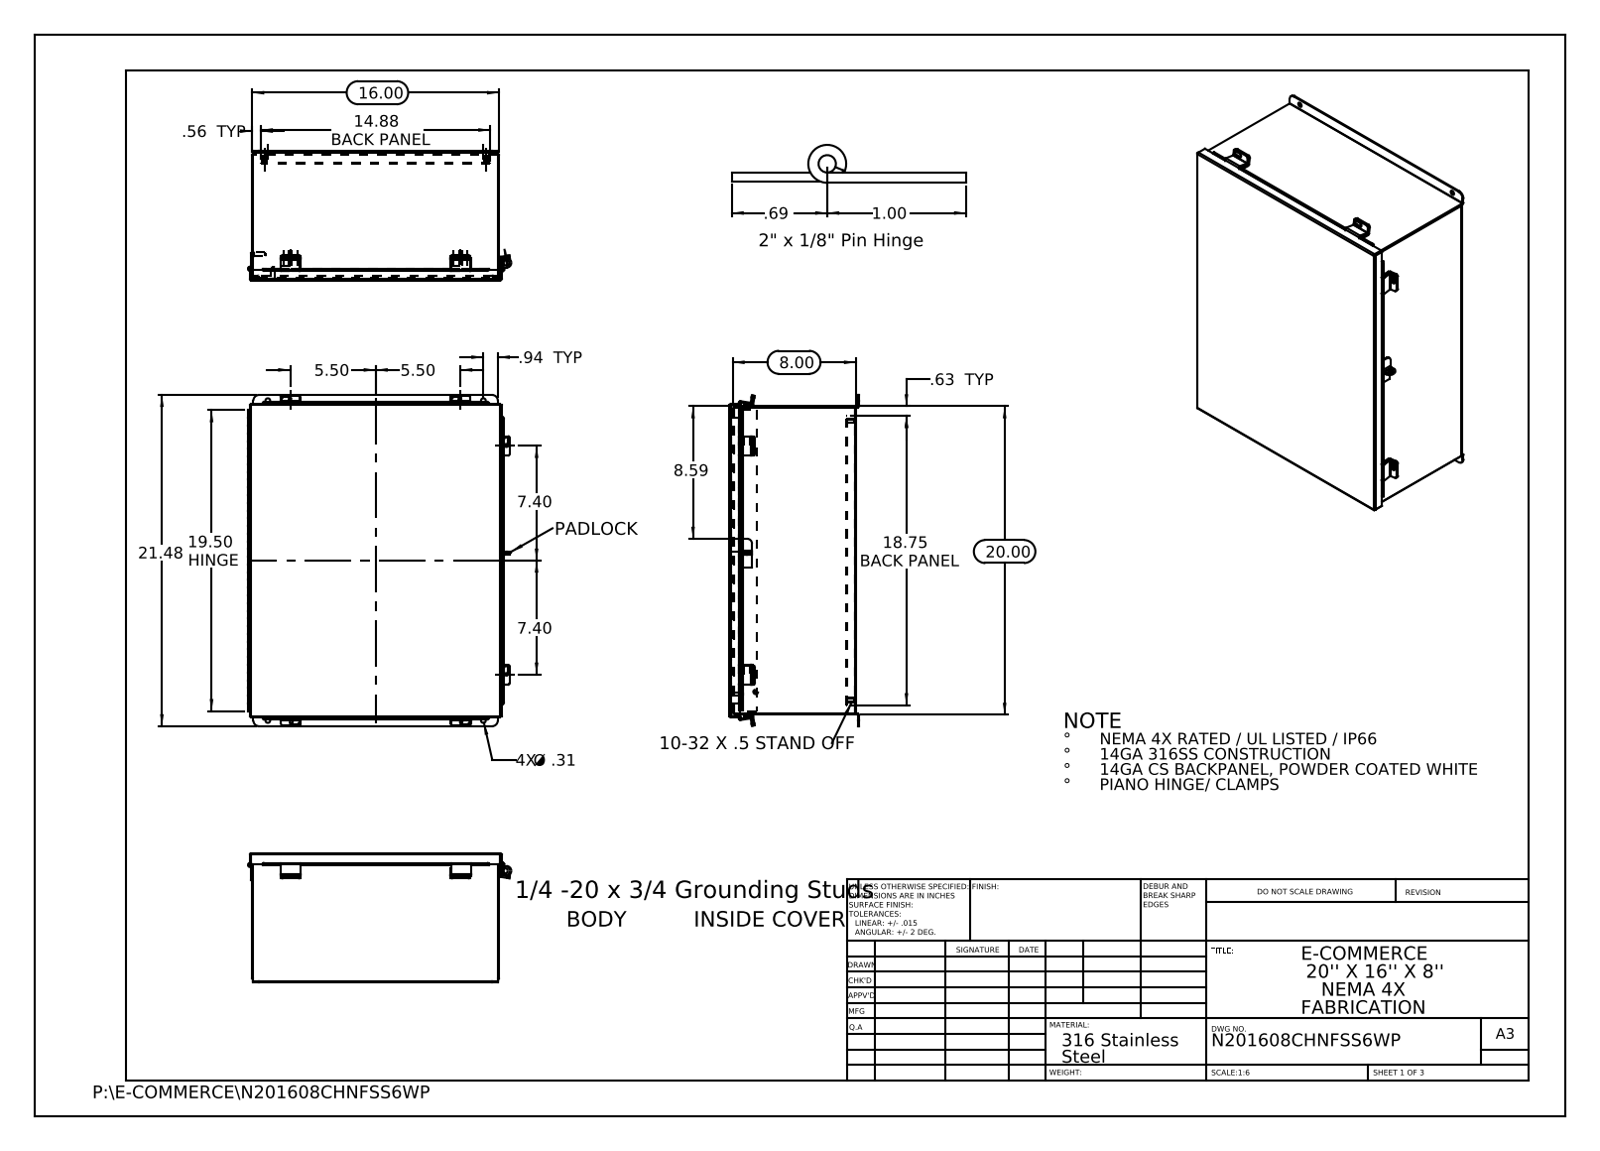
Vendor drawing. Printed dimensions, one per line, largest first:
21.48
20.00
19.50 HINGE
18.75 BACK PANEL
16.00
14.88 BACK PANEL
8.59
8.00
7.40
7.40
5.50
5.50
1.00
.94 TYP
.69
.63 TYP
.56 TYP
4X Ø .31
